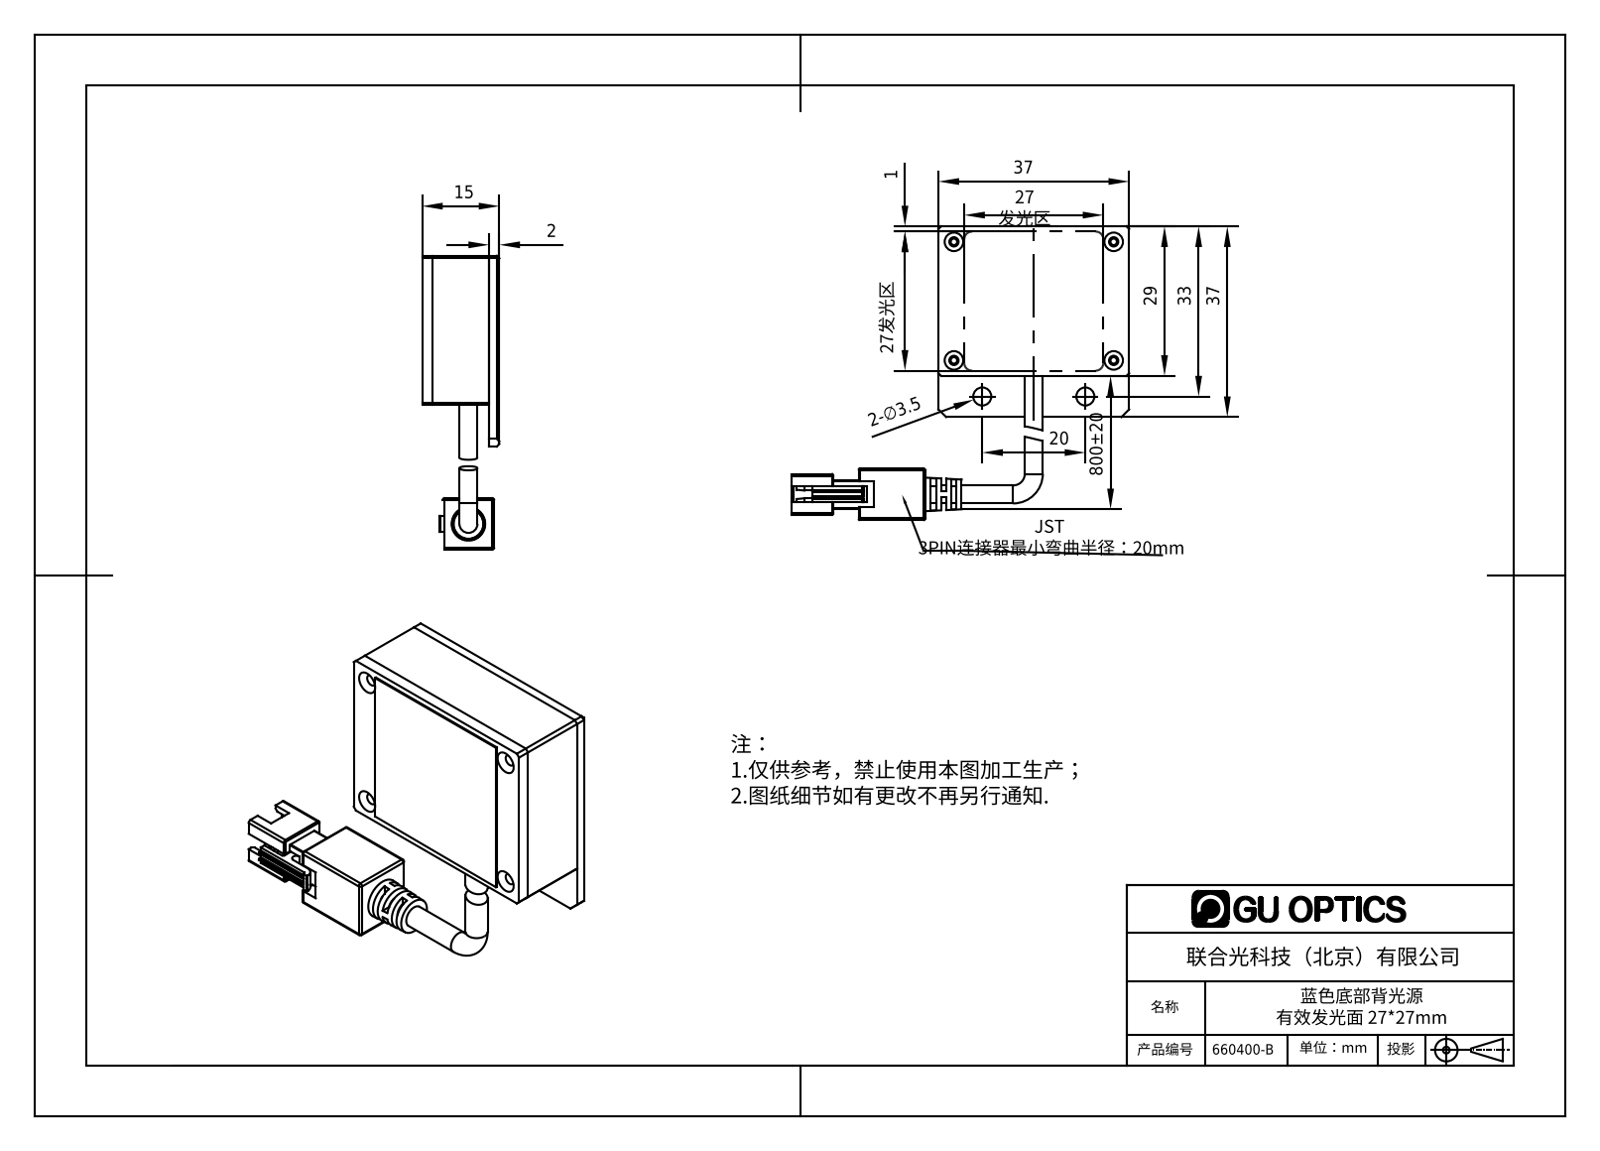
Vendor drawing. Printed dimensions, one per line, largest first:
800±20
37
37
33
29
27 发光区
27发光区
20
15
2-∅3.5
2
1
